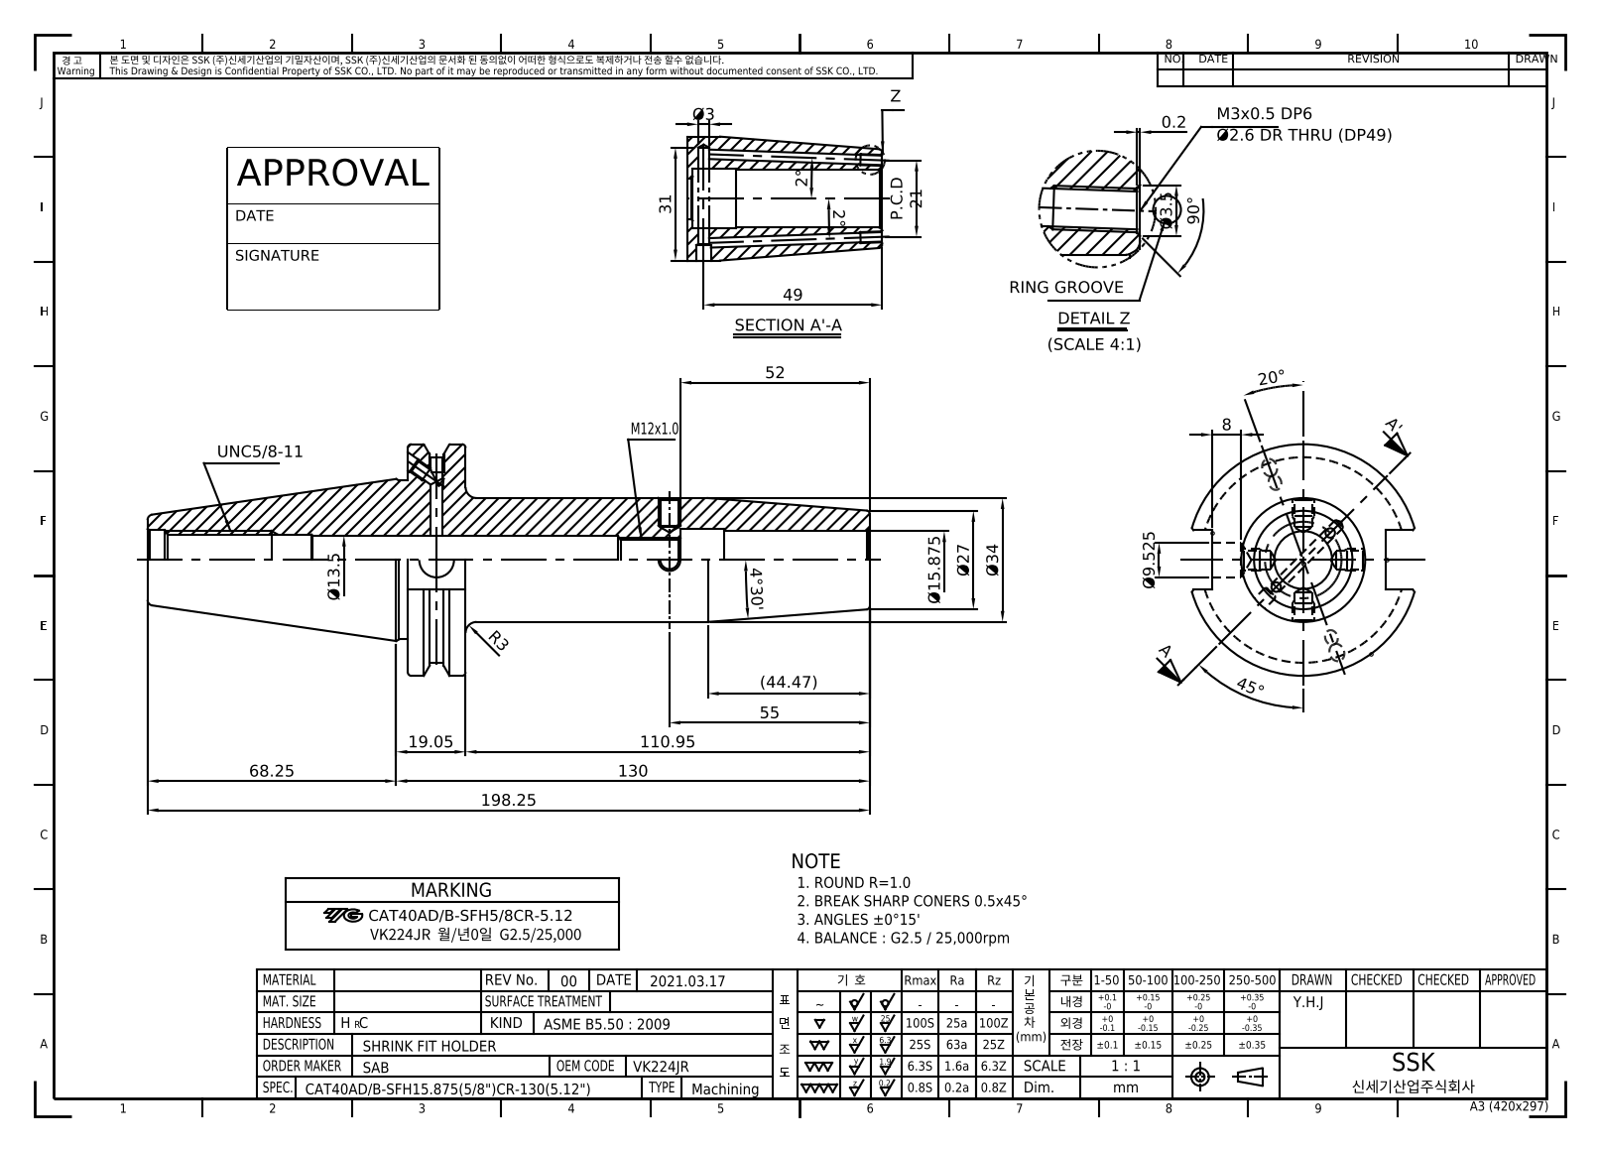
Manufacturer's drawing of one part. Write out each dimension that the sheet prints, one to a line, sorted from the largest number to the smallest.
198.25
130
110.95
90°
68.25
55
52
49
45°
(44.47)
Ø34
31
Ø27
P.C.D 21
20°
19.05
Ø15.875
Ø13.5
Ø9.525
8
4°30'
Ø3.5
R3
Ø3
2°
2°
0.2
